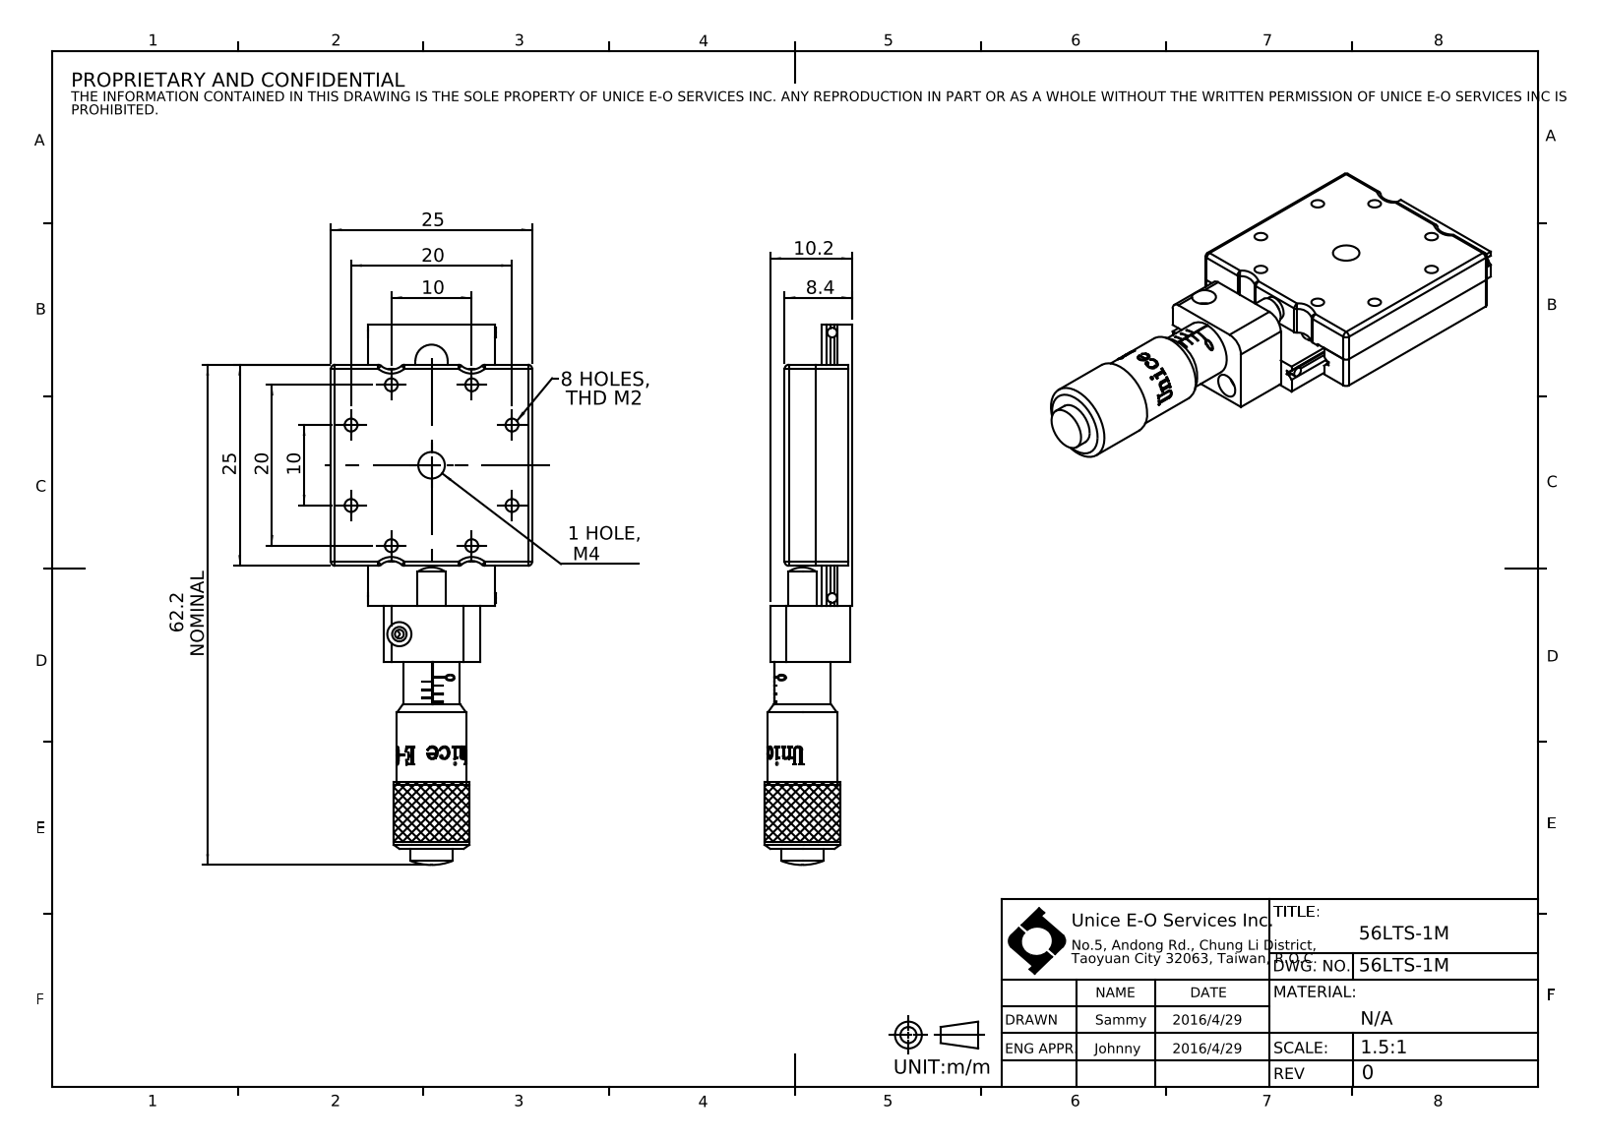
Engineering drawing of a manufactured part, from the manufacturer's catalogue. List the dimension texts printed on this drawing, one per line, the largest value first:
62.2 NOMINAL
25
25
20
20
10.2
10
10
8.4
1 HOLE, M4
